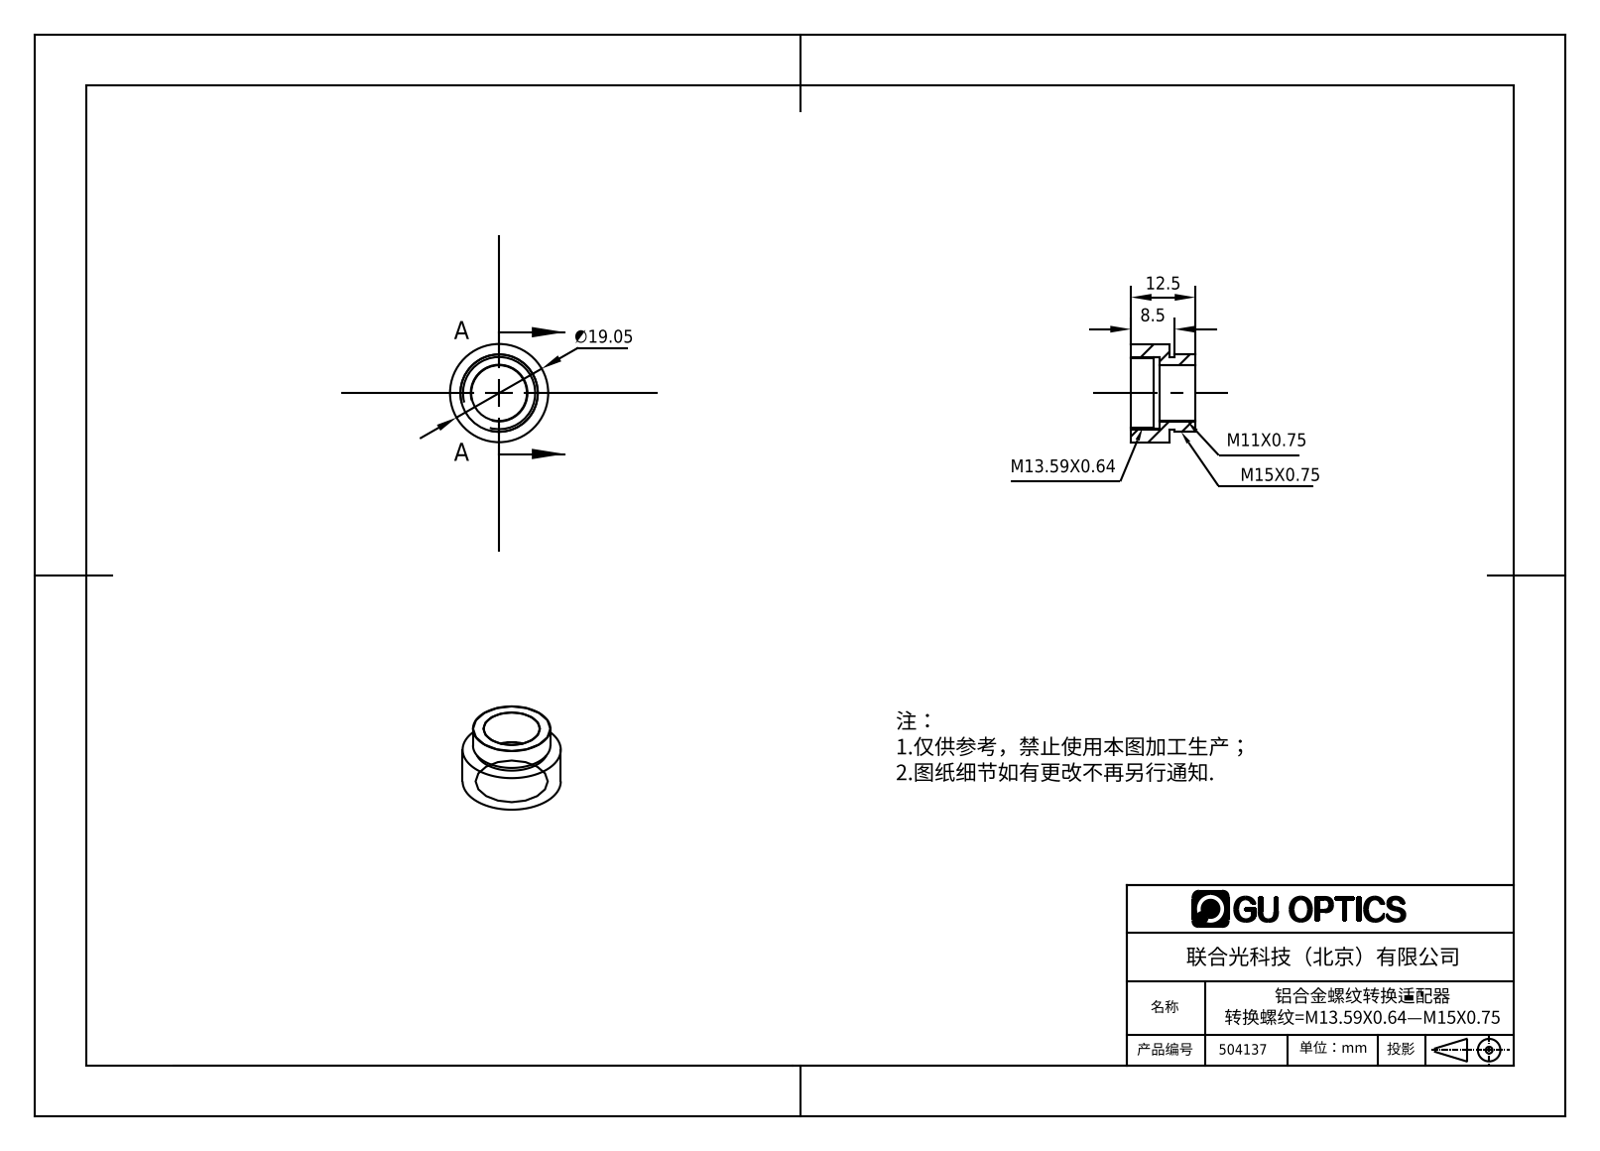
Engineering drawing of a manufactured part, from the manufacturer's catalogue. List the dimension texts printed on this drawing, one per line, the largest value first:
∅19.05
12.5
8.5
